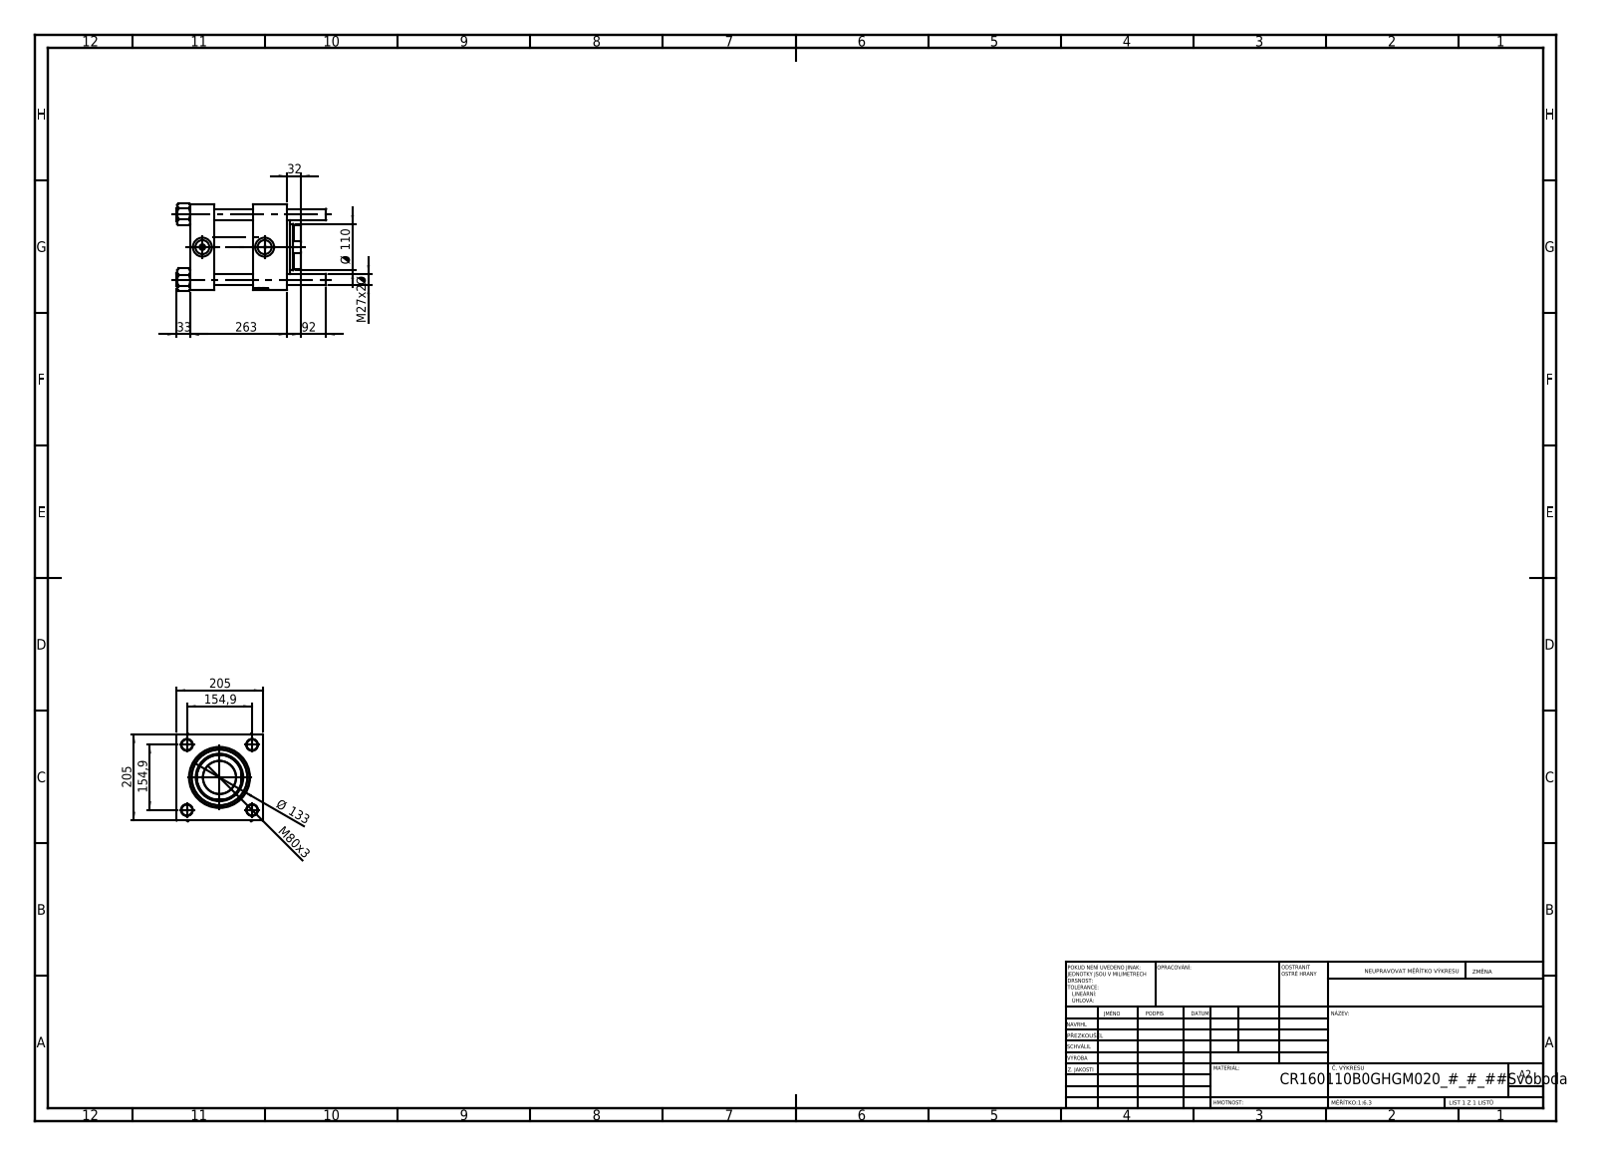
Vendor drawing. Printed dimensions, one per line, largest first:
263
205
205
154,9
154,9
Ø 133
Ø 110
92
M80x3
33
32
M27x2 Ø
